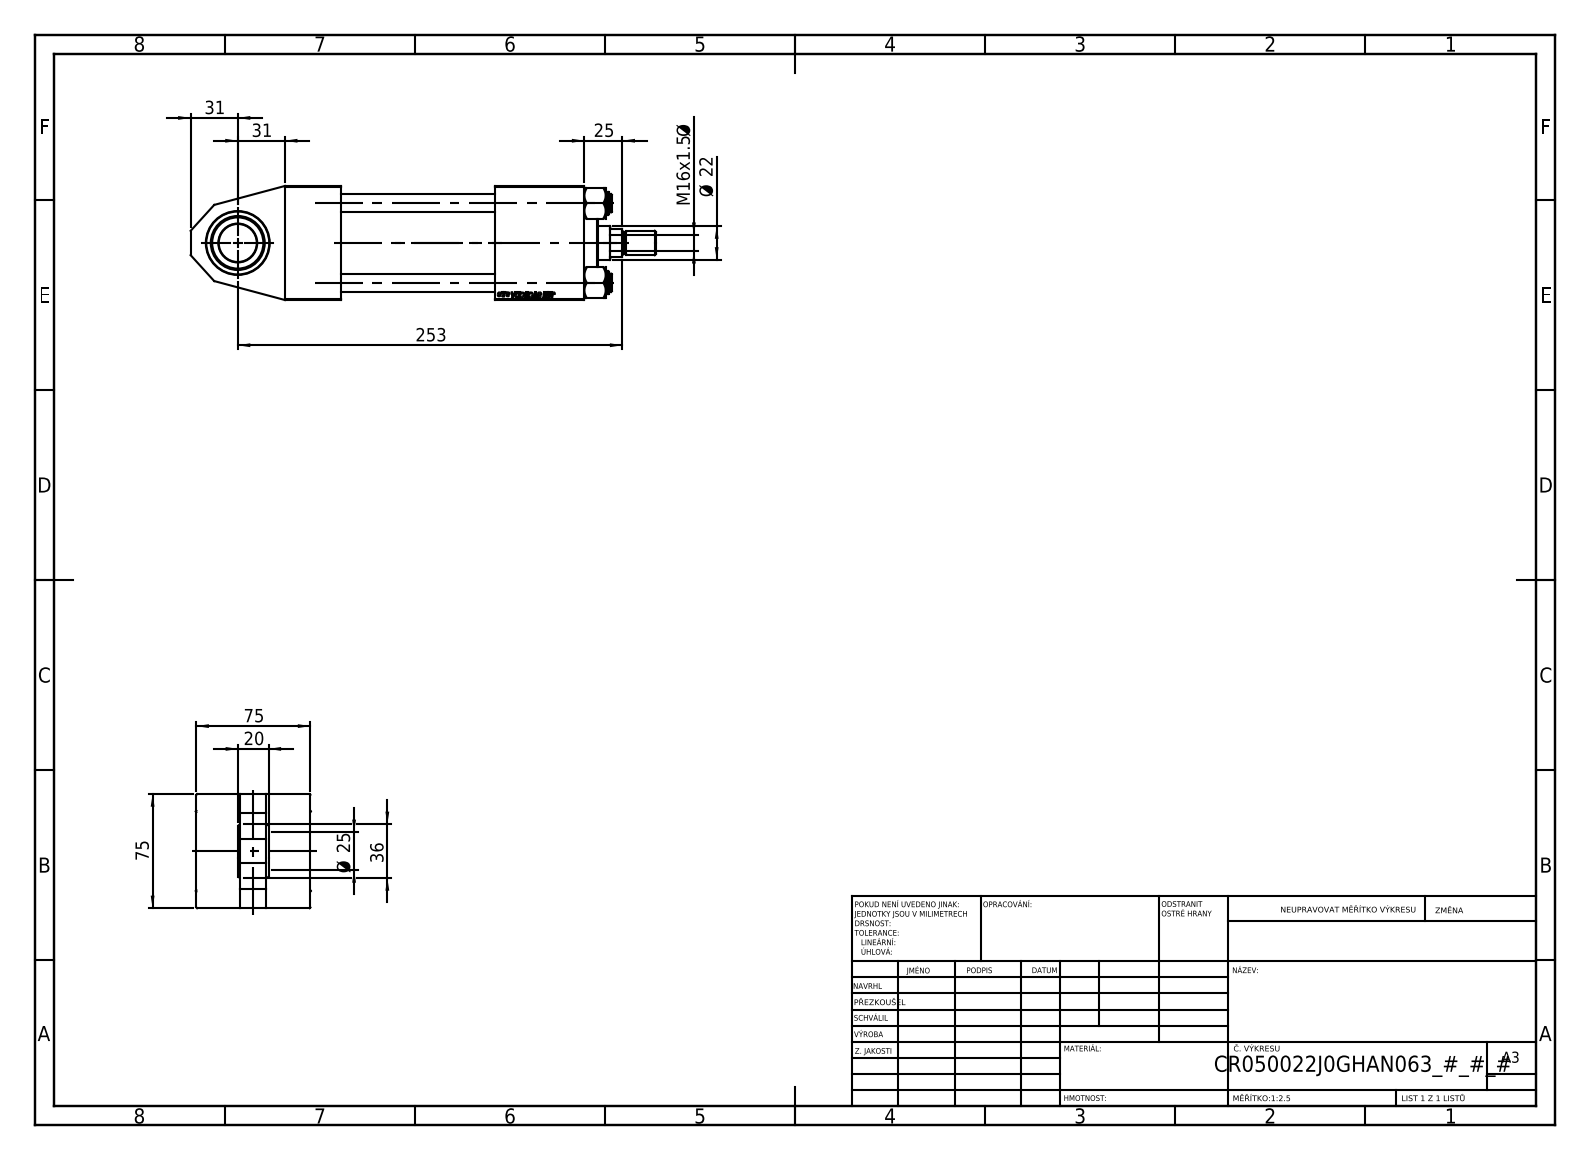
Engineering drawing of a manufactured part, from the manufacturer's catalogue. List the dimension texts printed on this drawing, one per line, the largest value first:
253
75
75
36
31
31
25
Ø 25
Ø 22
20
M16x1.5 Ø
